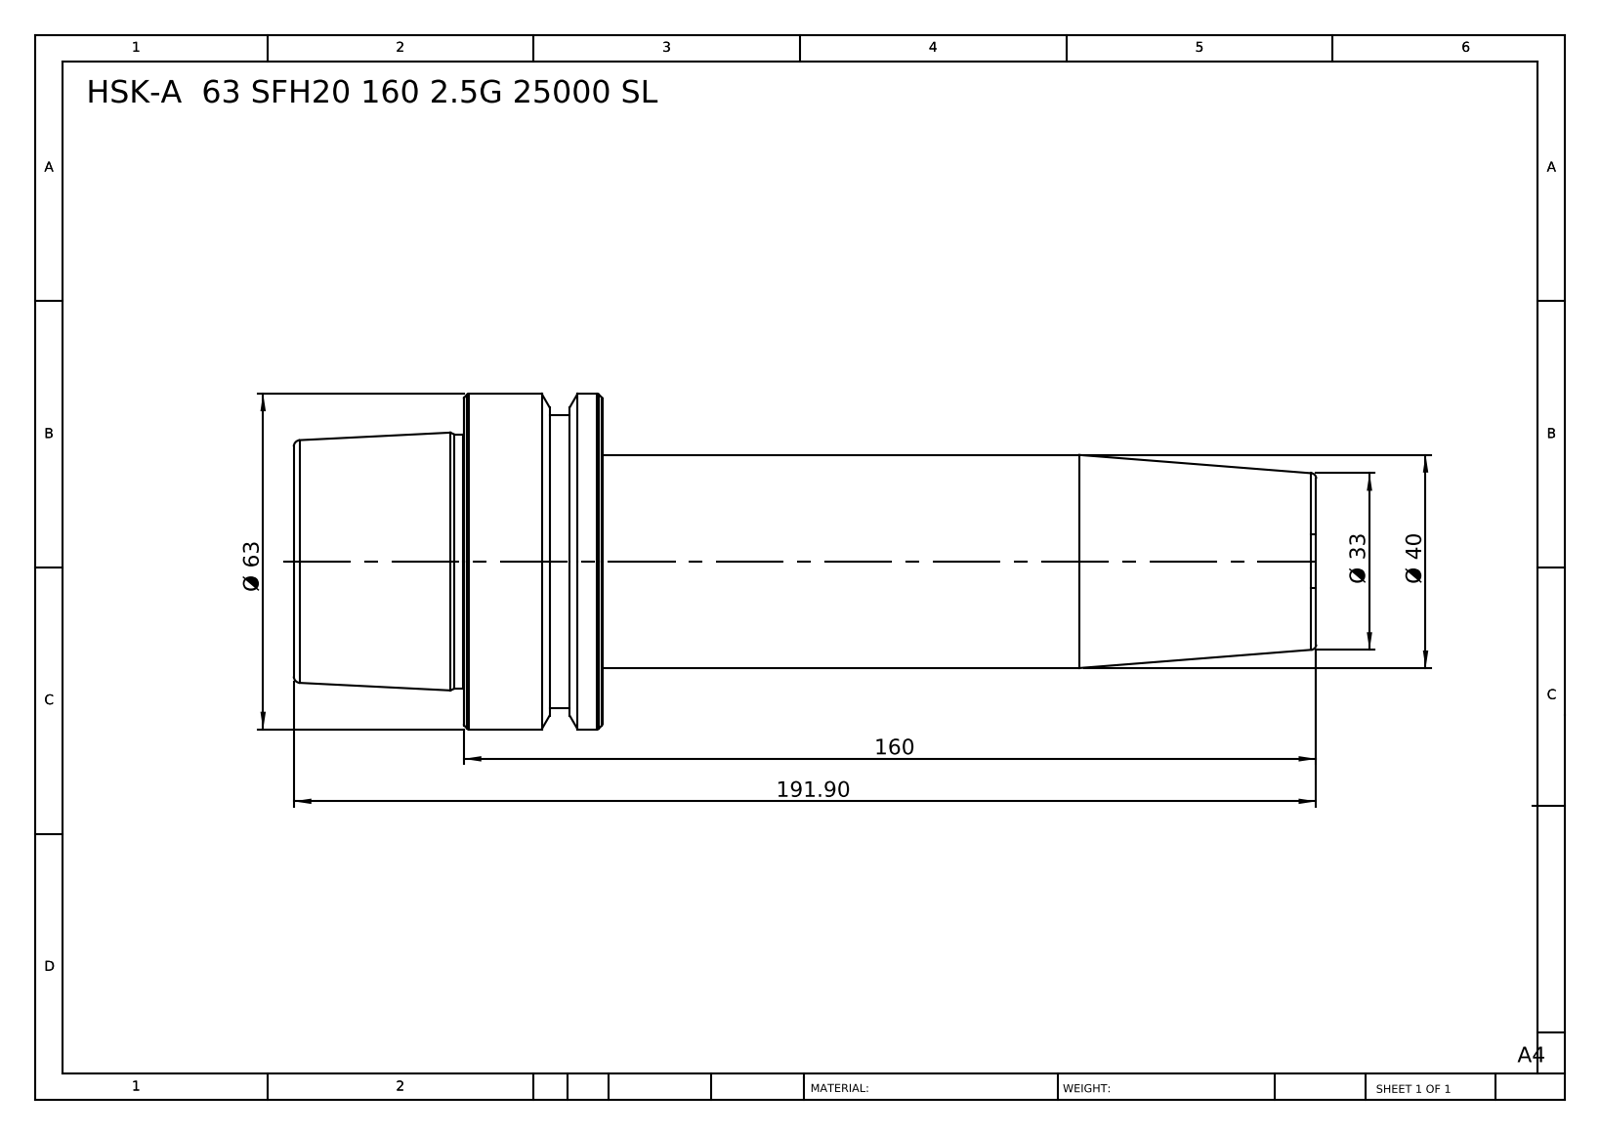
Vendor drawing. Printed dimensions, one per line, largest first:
191.90
160
Ø 63
Ø 40
Ø 33
